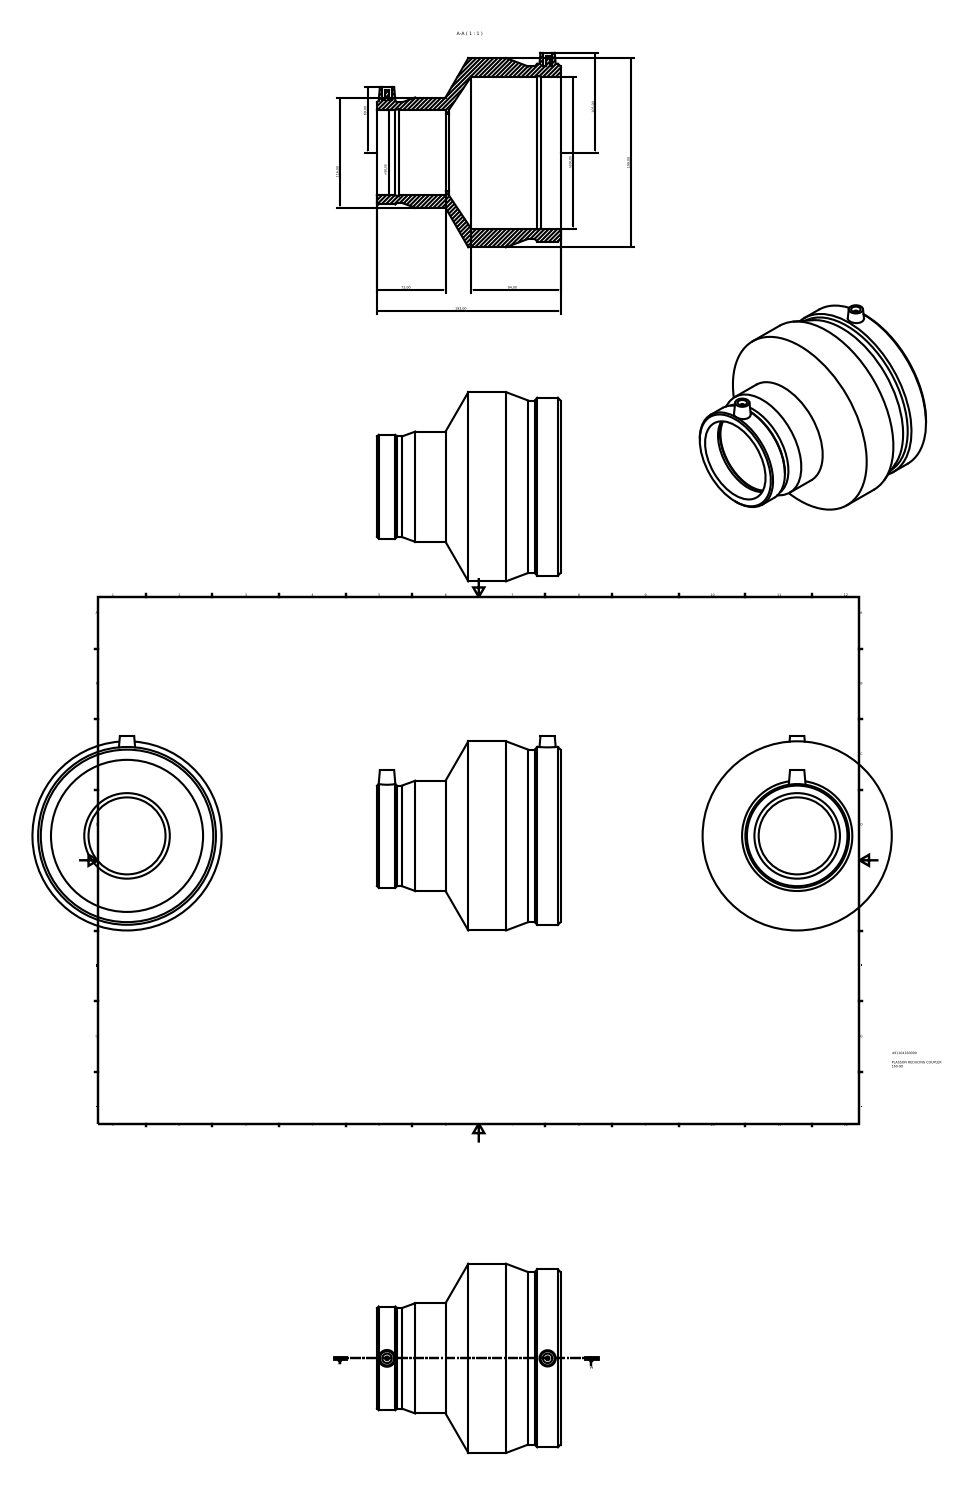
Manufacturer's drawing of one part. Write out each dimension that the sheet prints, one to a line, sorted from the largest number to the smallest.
199,00
193,00
n160,00
116,00
105,00
94,00
n90,00
72,00
69,00
